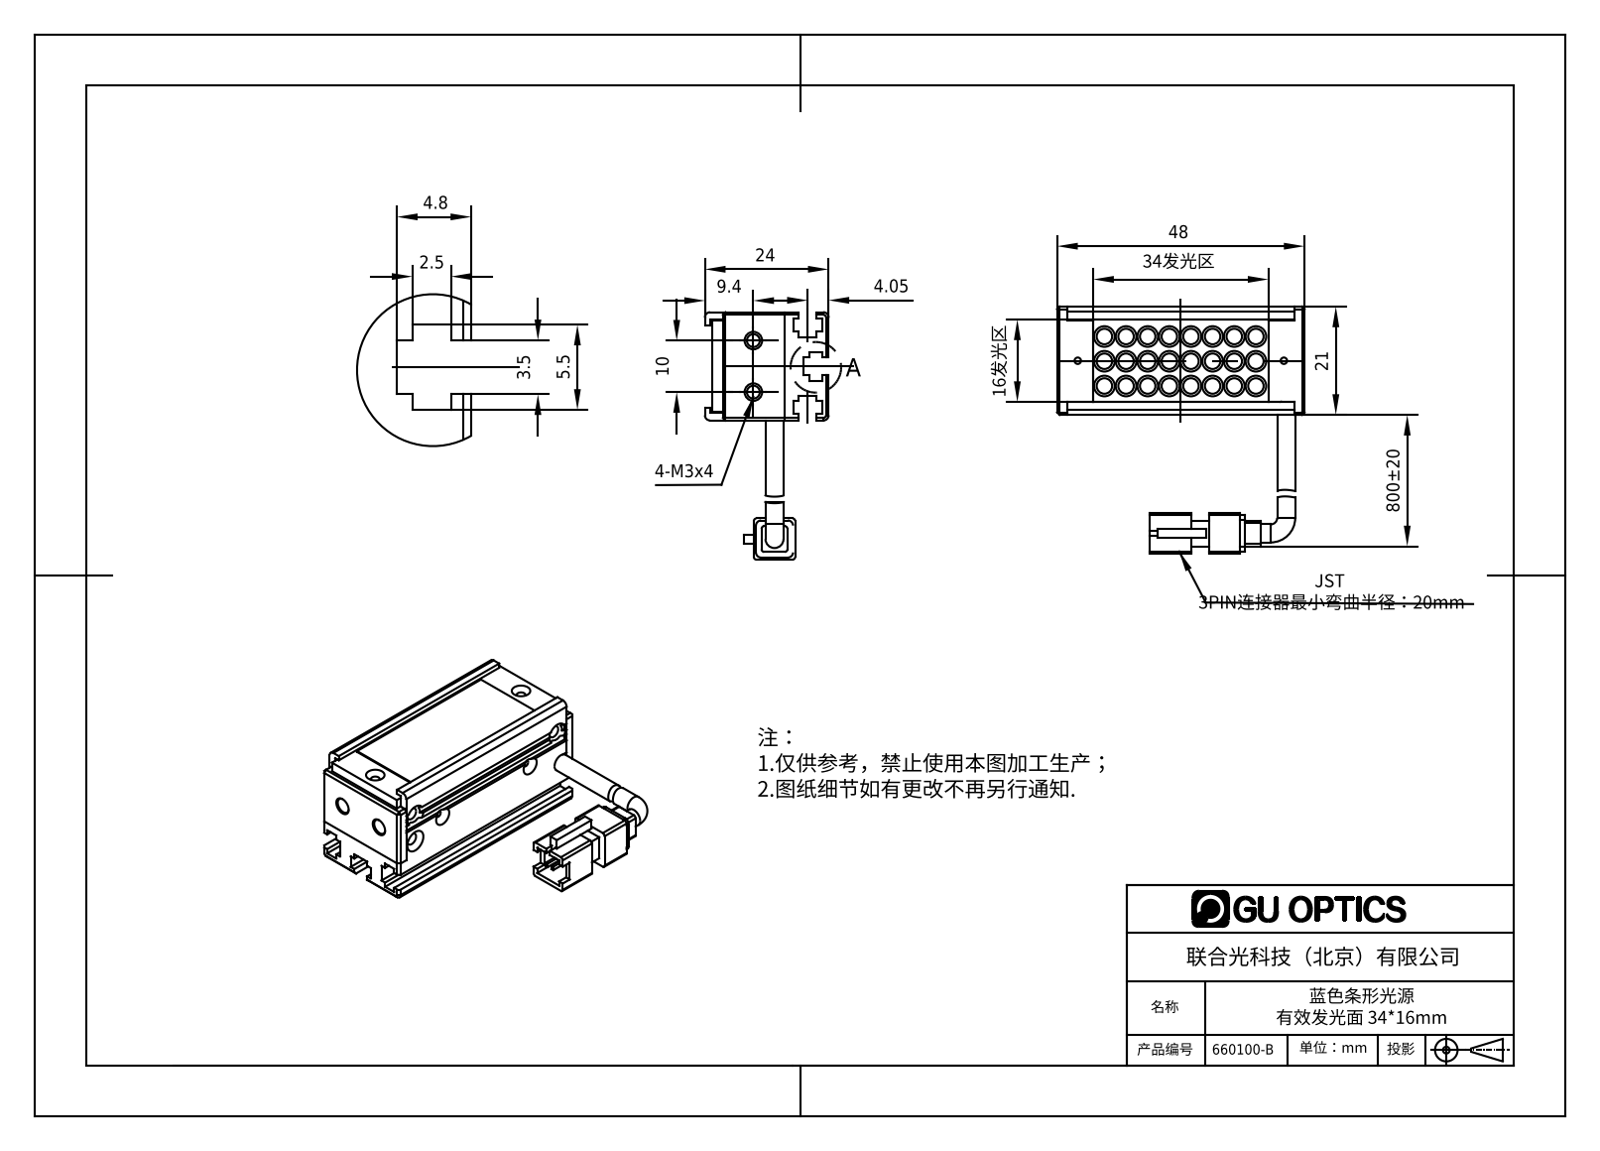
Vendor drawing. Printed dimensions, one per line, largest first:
800±20
48
34发光区
24
21
16发光区
10
9.4
5.5
4.8
4.05
3.5
2.5
